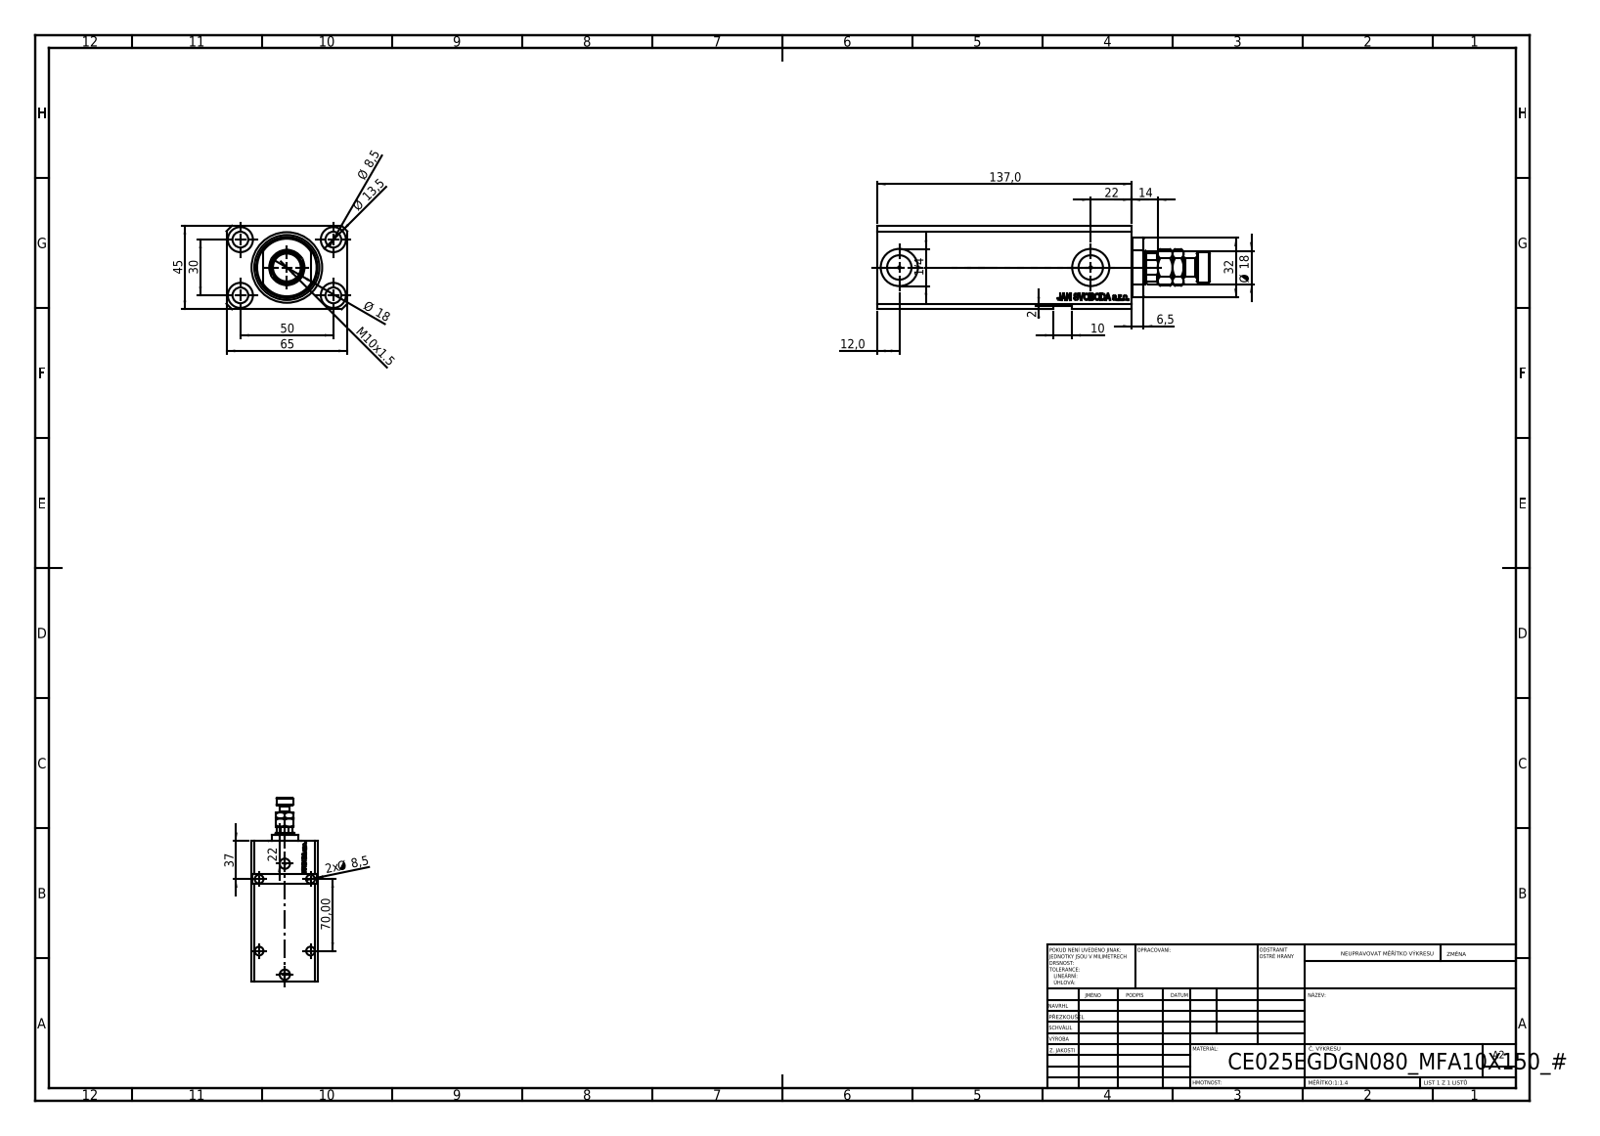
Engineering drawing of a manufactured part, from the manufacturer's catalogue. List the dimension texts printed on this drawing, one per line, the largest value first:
137,0
70,00
65
50
45
37
32
30
22
22
Ø 18
Ø 18
14
Ø 13,5
12,0
M10x1.5
10
Ø 8,5
2x Ø 8,5
6,5
2
1/4
